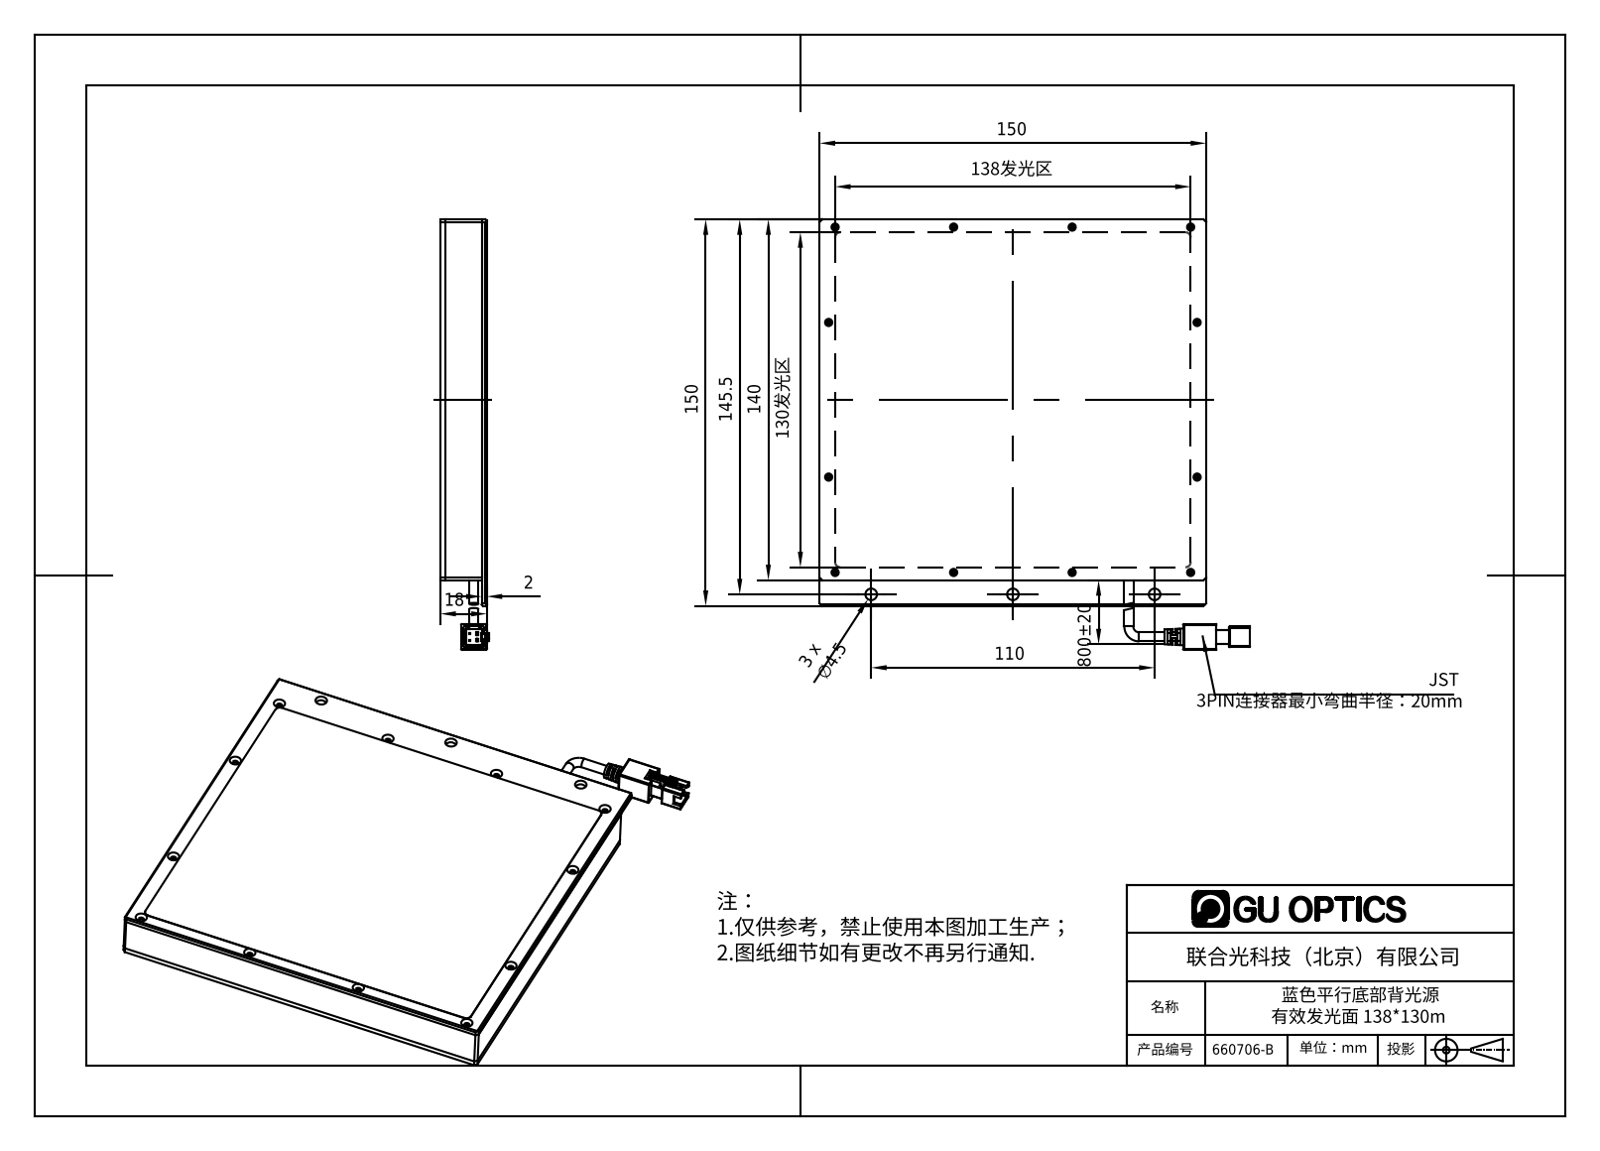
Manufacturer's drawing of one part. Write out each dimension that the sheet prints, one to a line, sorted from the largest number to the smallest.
800±20
150
150
145.5
140
138发光区
130发光区
110
18
3 x ∅4.5
2
